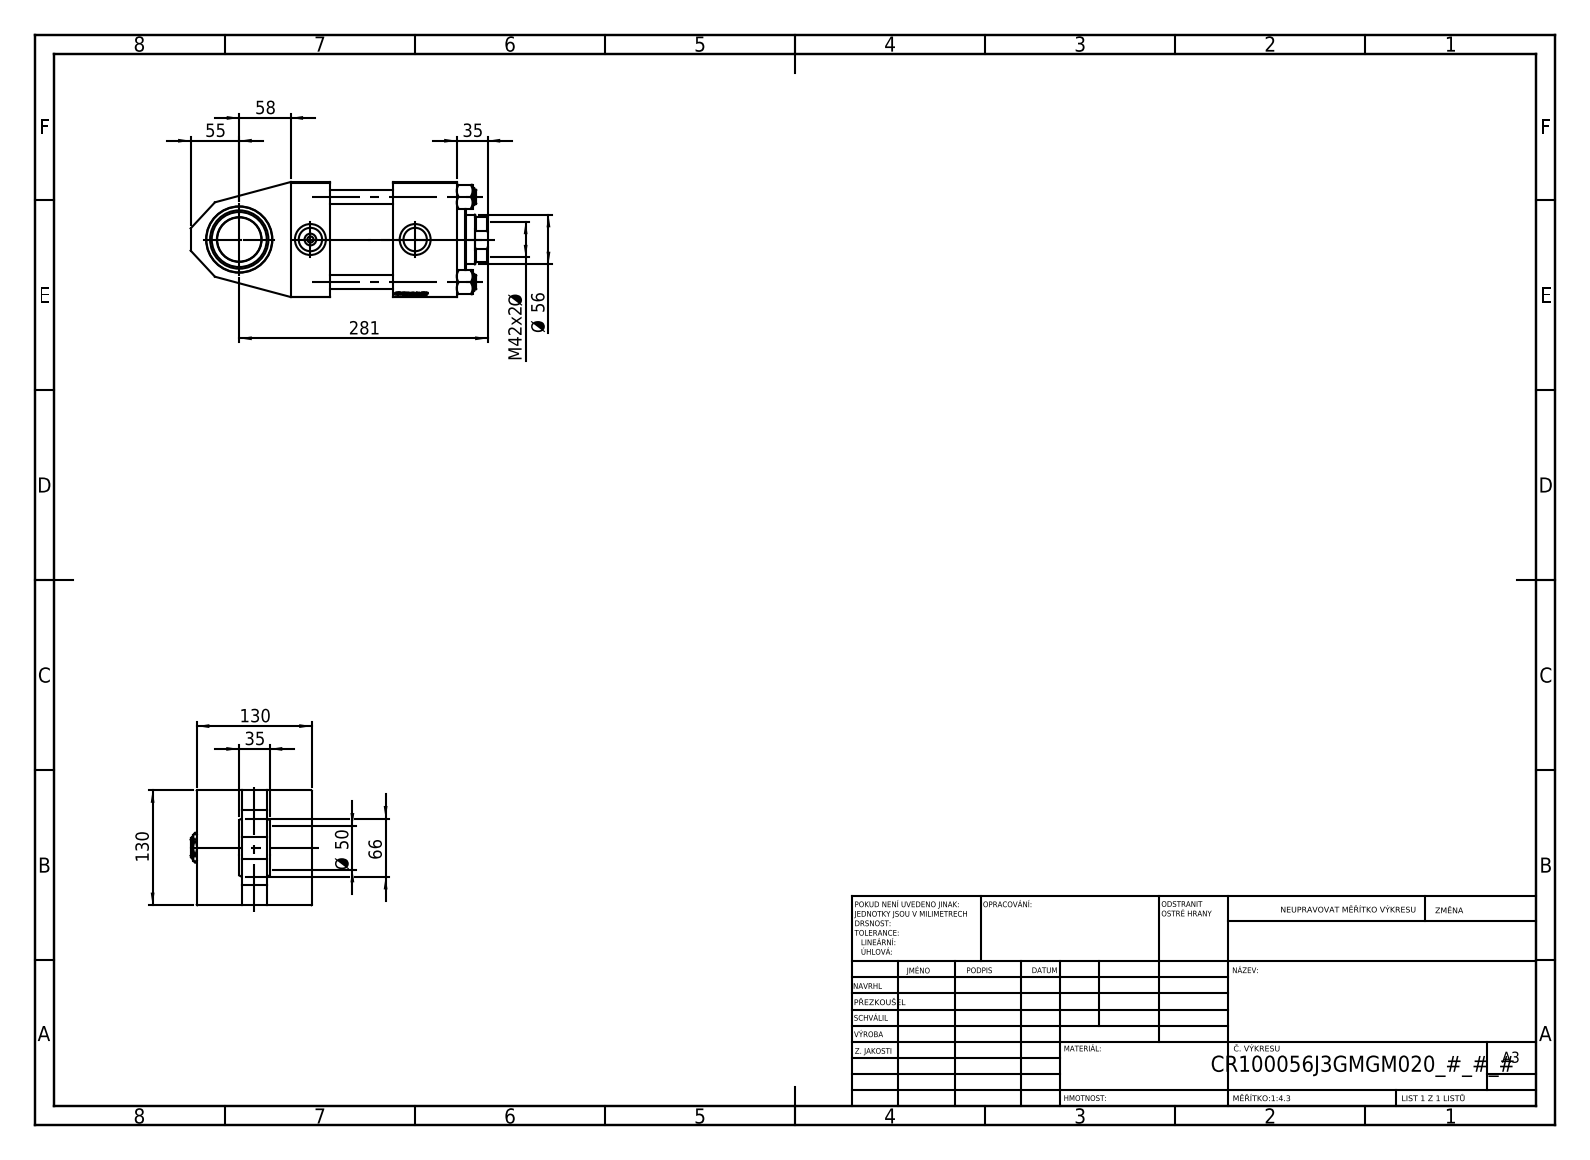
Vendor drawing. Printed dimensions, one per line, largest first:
281
130
130
66
58
Ø 56
55
Ø 50
M42x2 Ø
35
35
